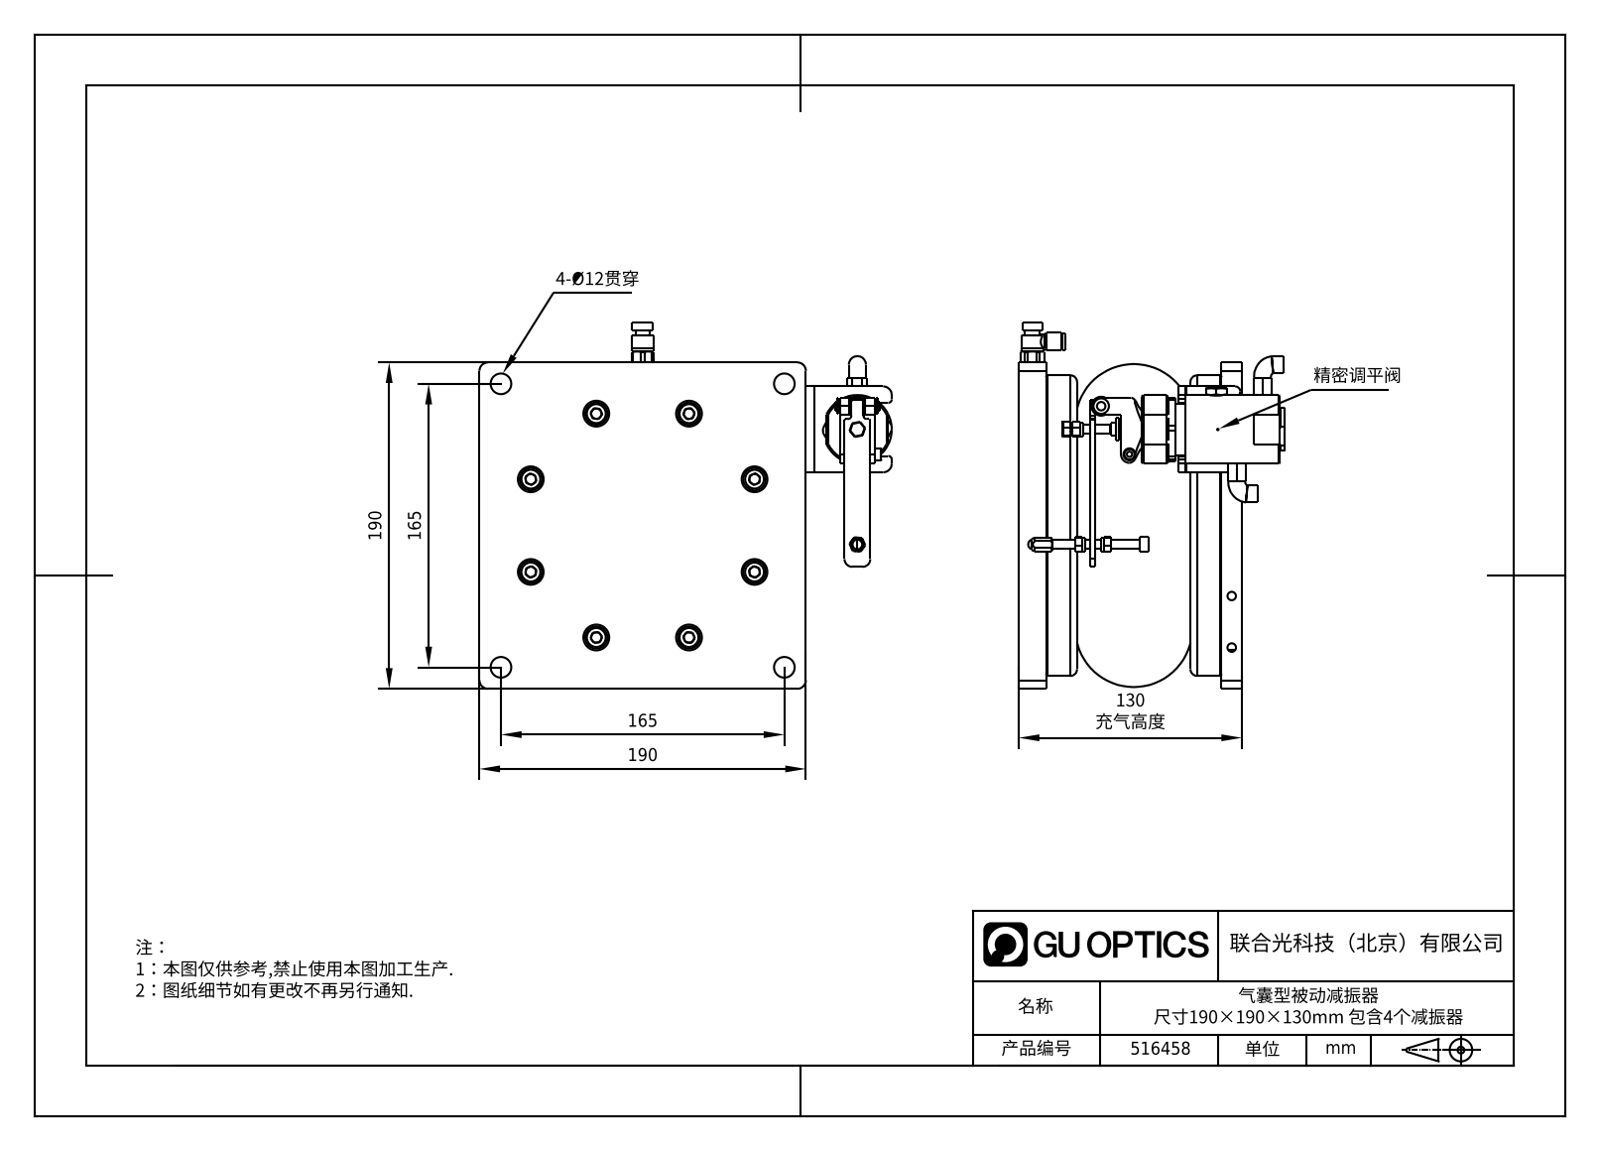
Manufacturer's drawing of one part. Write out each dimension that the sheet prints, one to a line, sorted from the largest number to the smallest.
190
190
165
165
130 充气高度
